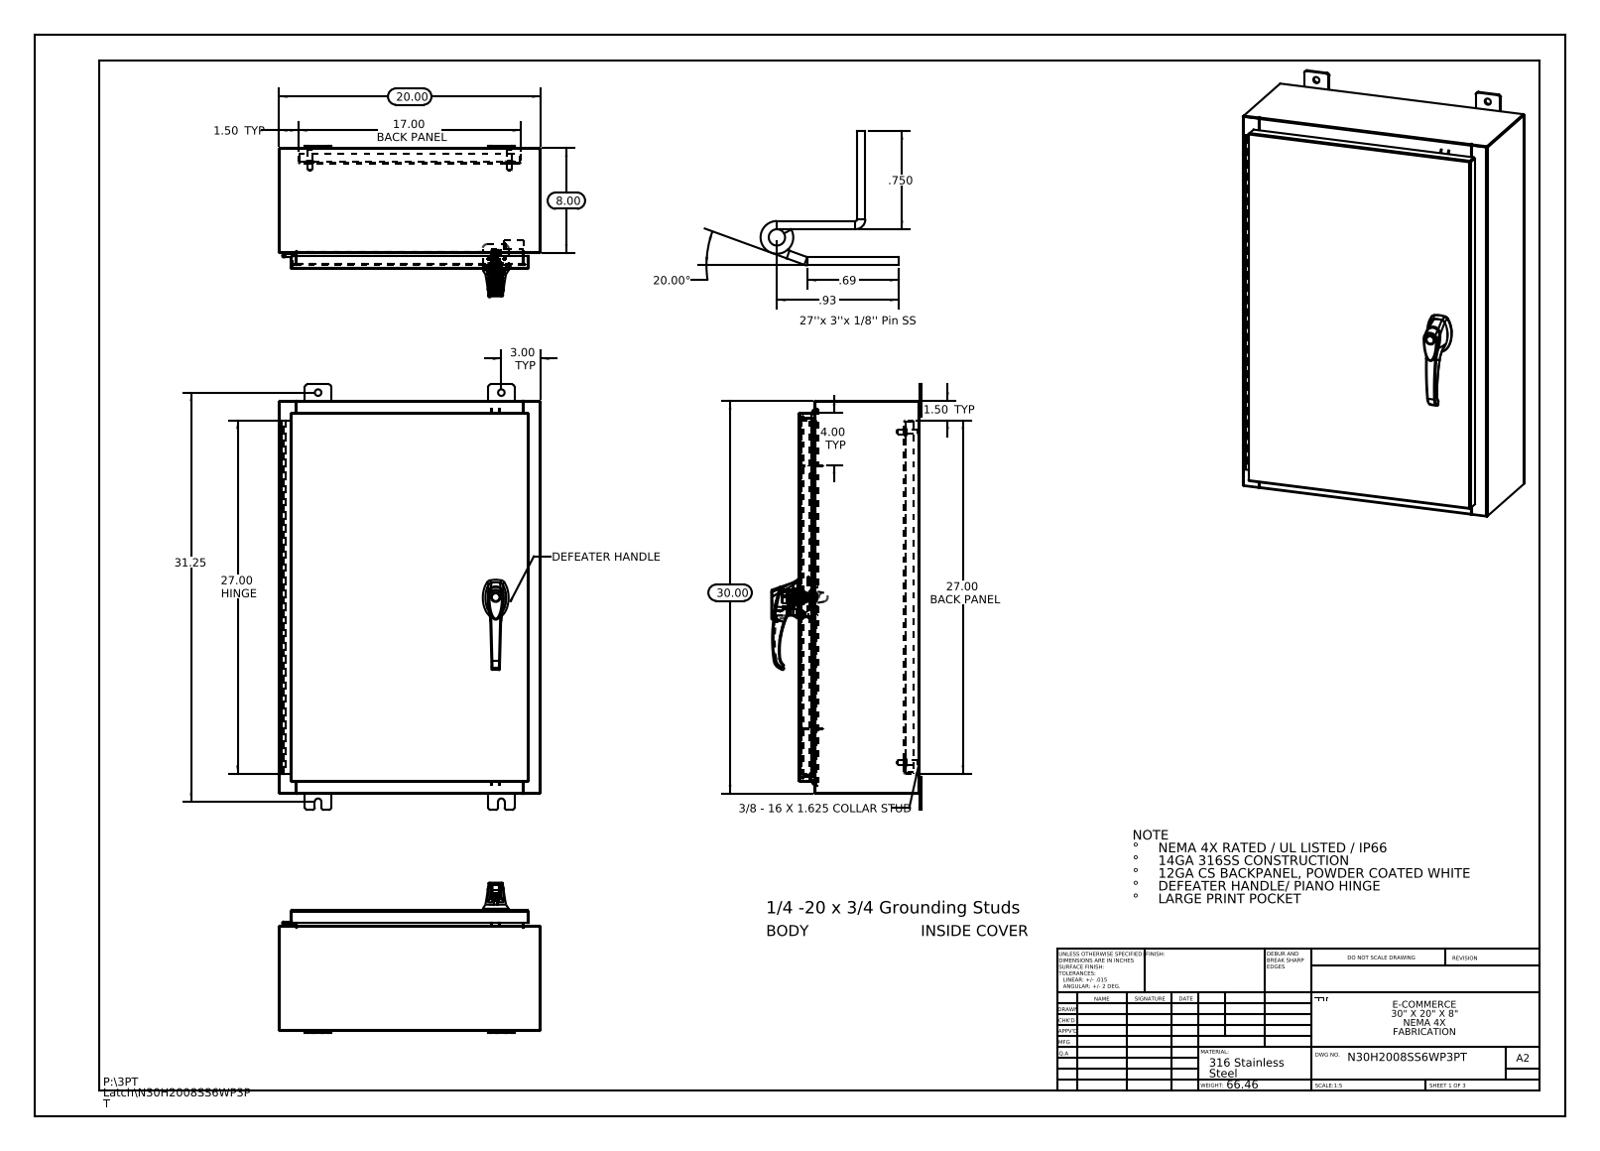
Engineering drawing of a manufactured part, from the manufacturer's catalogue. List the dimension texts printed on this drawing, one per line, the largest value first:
31.25
30.00
27.00 HINGE
27.00 BACK PANEL
20.00
20.00°
17.00 BACK PANEL
8.00
4.00 TYP
3.00 TYP
1.50 TYP
1.50 TYP
.93
.750
.69
